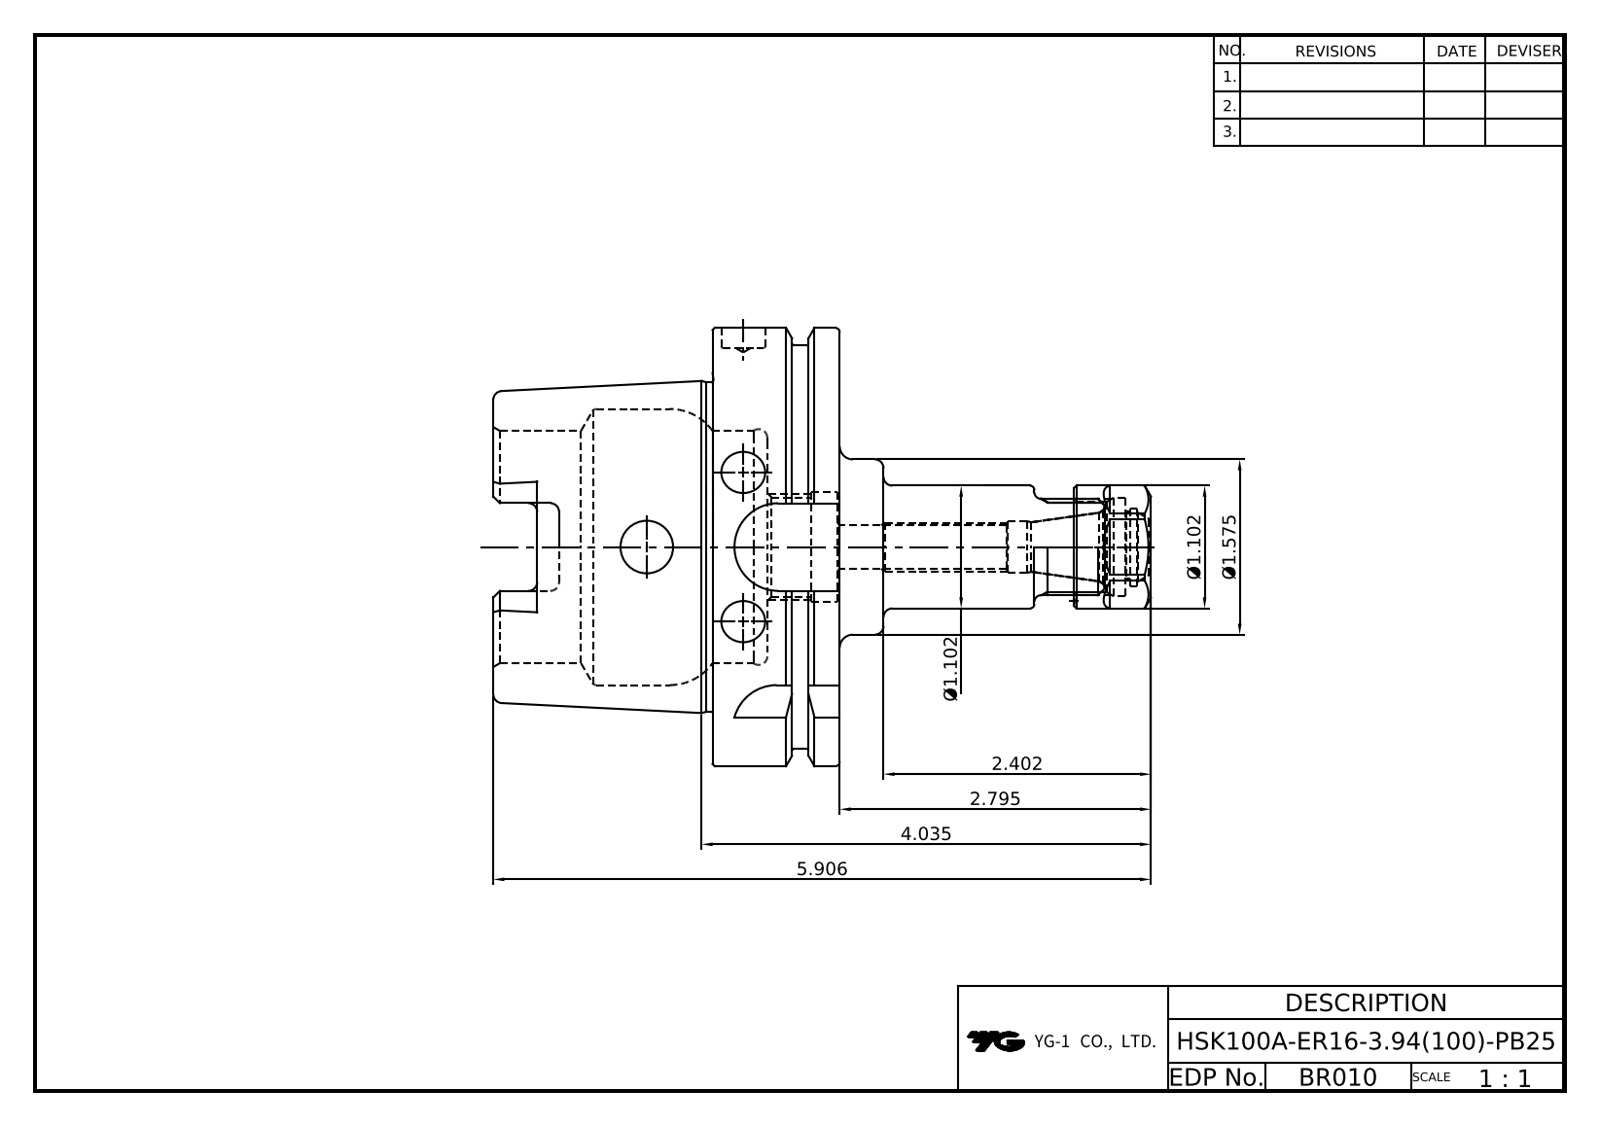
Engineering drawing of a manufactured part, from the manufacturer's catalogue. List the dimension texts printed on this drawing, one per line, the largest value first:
5.906
4.035
2.795
2.402
Ø1.575
Ø1.102
Ø1.102
